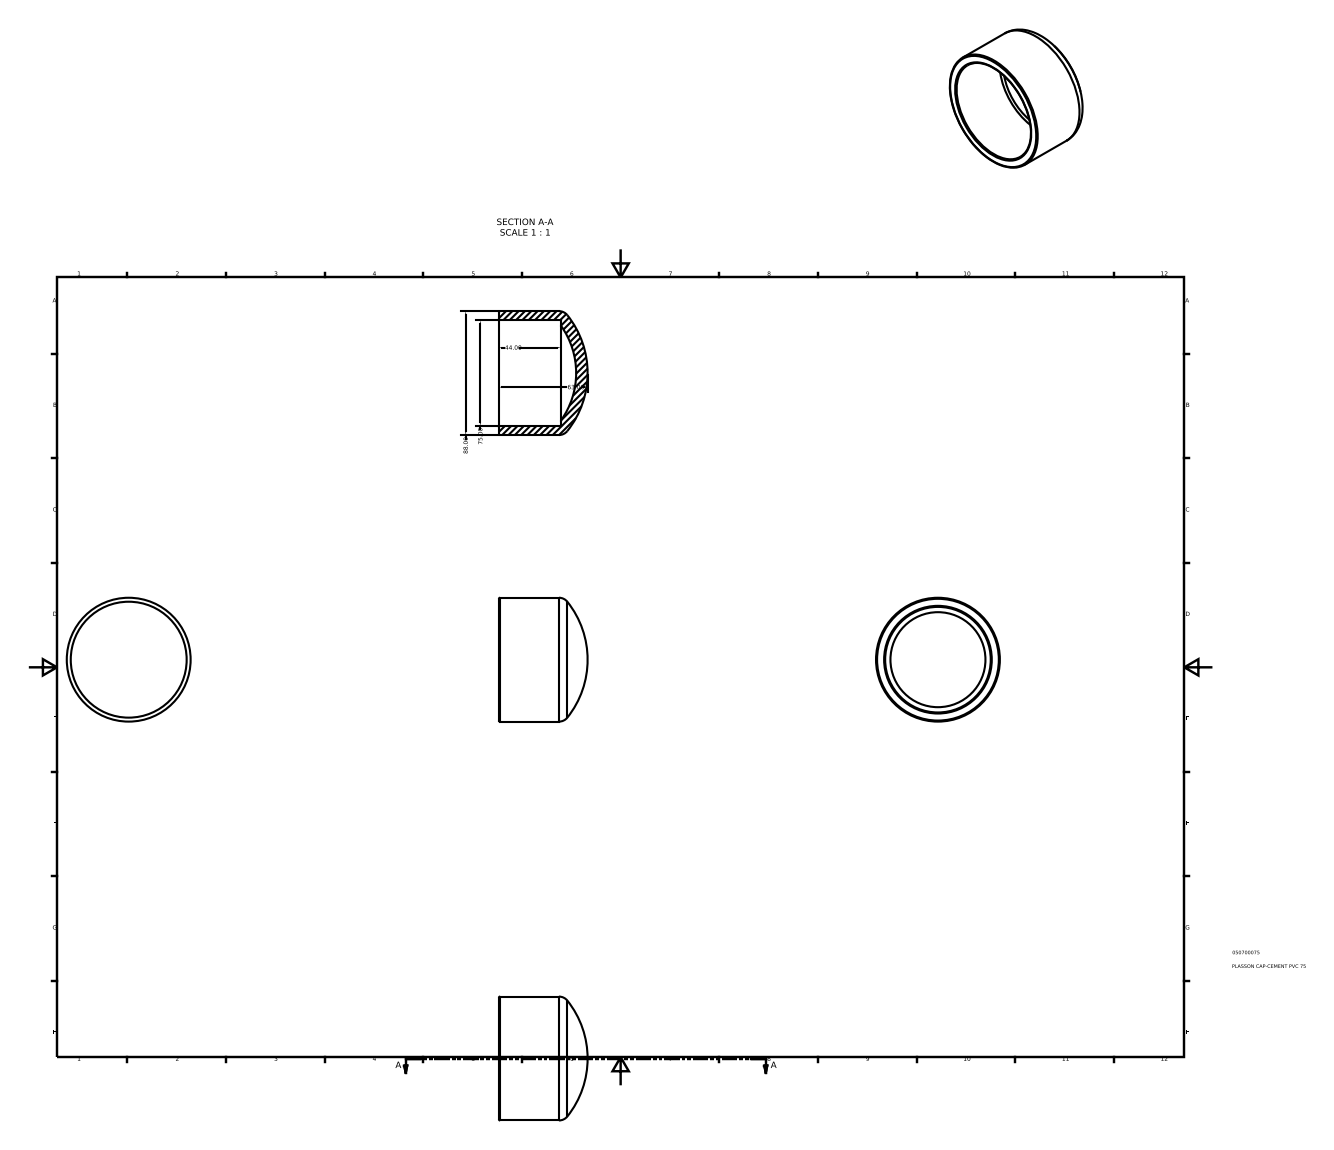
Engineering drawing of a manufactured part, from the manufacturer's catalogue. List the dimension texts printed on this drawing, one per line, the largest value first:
88.00
75.00
63.00
44.00
